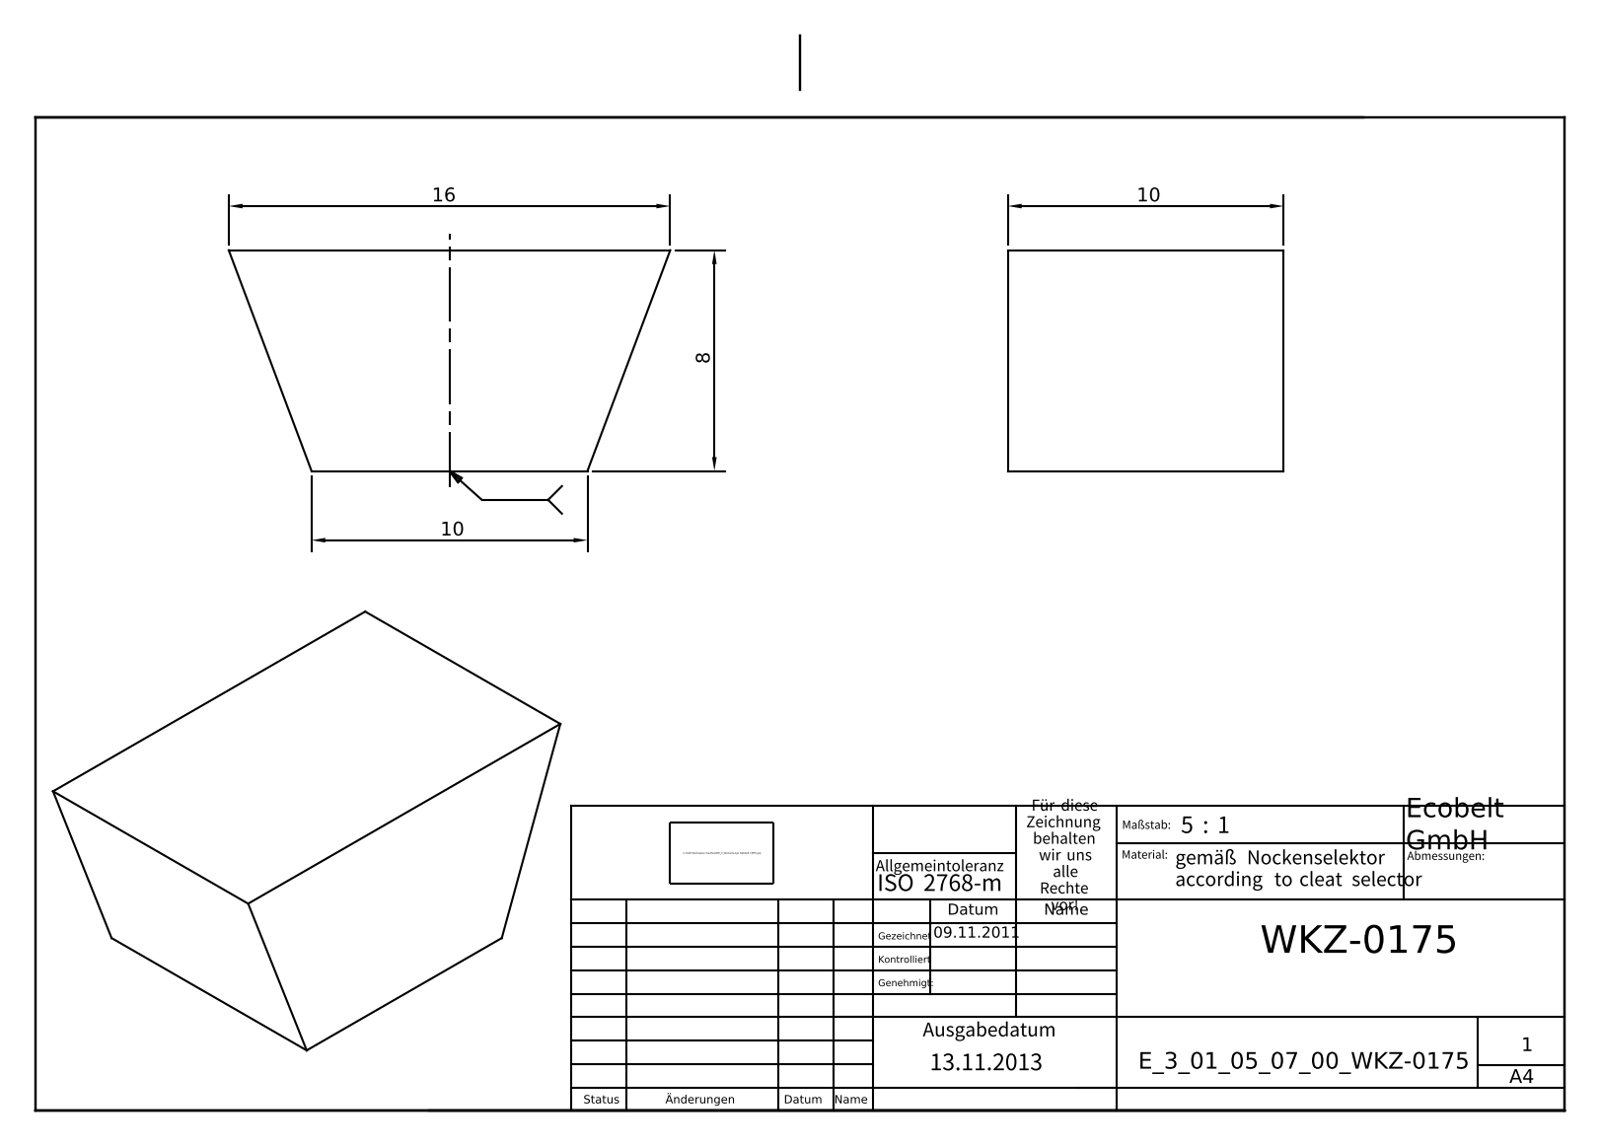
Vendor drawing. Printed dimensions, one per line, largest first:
16
10
10
8
